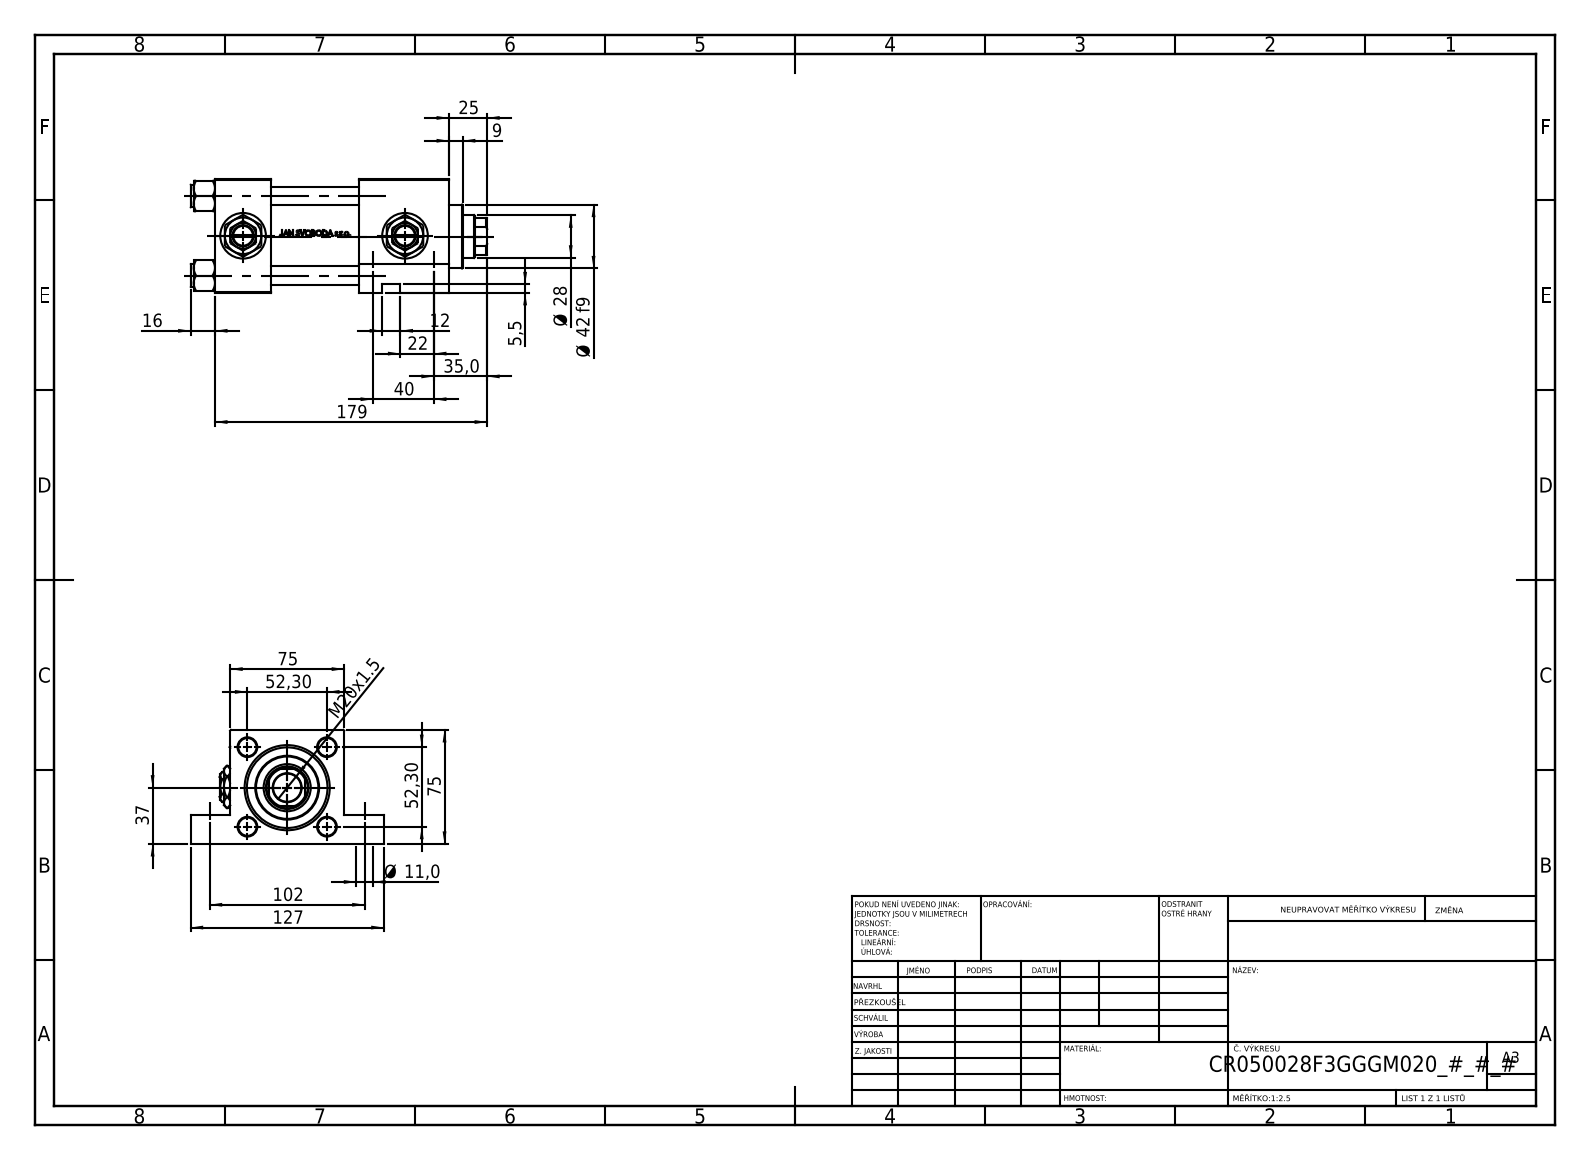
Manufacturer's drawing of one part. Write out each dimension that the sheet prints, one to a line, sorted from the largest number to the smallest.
179
127
102
75
75
52,30
52,30
Ø 42 f9
40
37
35,0
Ø 28
25
22
M20x1.5
16
12
Ø 11,0
9
5,5
